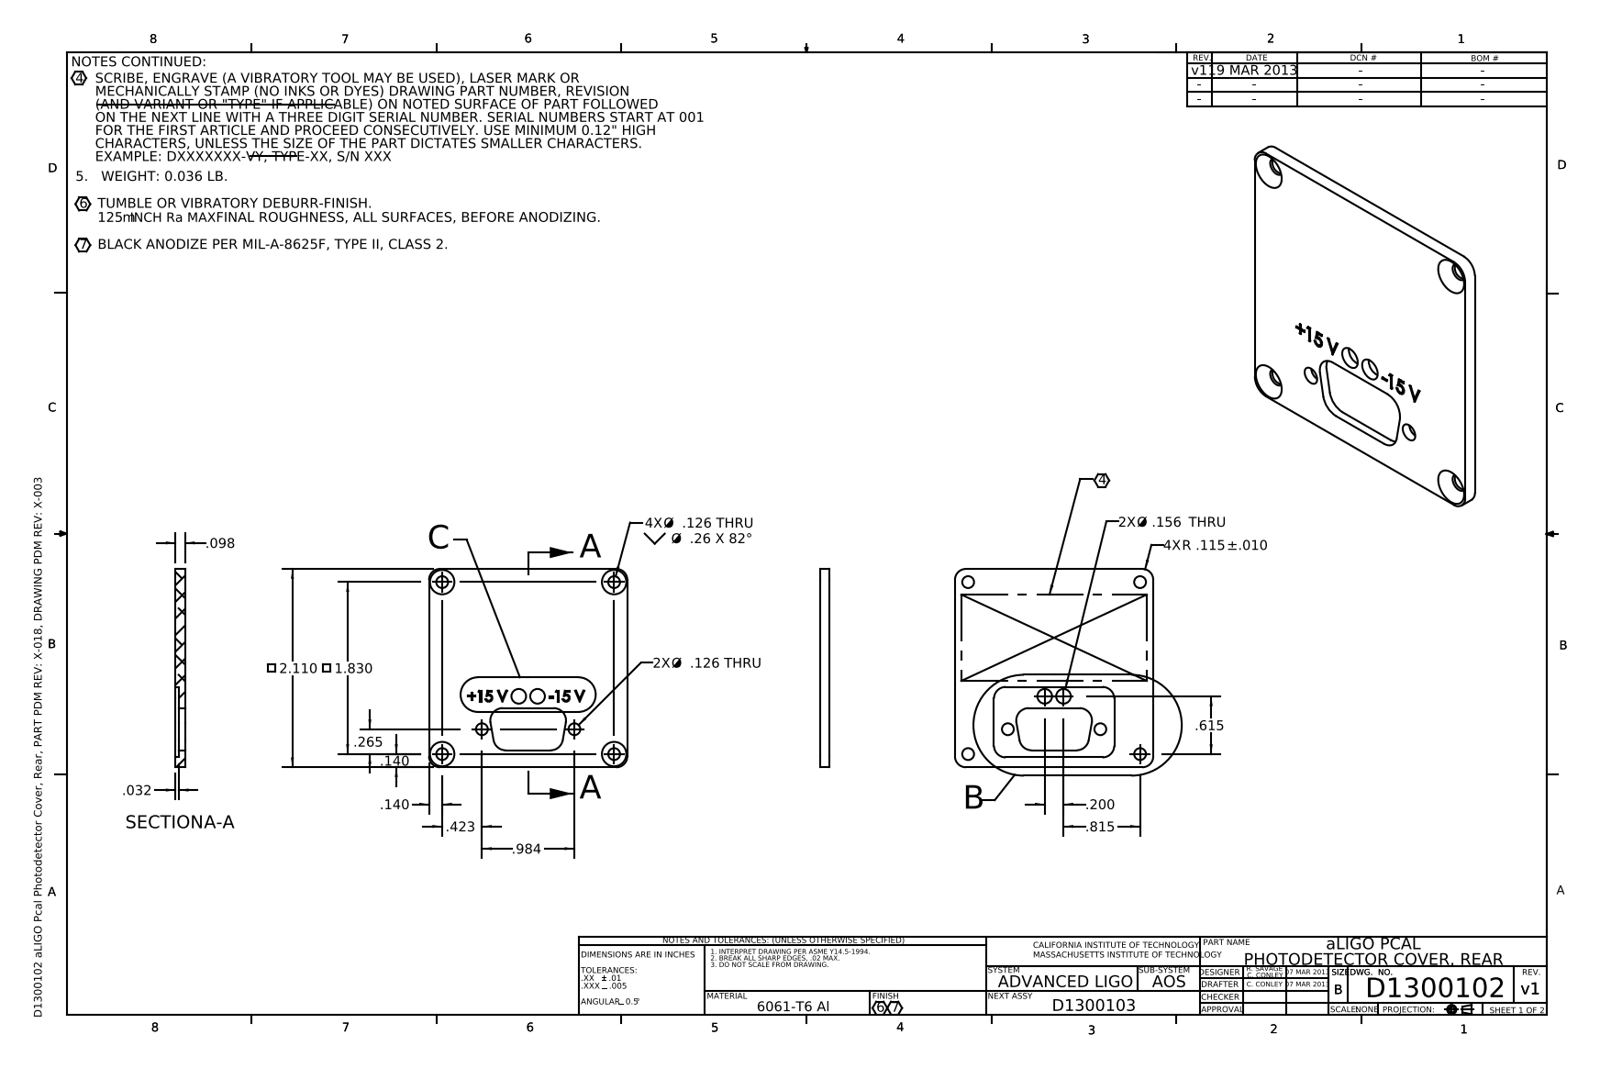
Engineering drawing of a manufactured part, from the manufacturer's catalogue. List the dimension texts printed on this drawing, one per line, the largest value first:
2.110
1.830
.984
.815
.615
.423
.265
.200
2X Ø .156 THRU
.140
.140
4X Ø .126 THRU Ø .26 X 82°
2X Ø .126 THRU
4X R .115 ±.010
.098
.032
